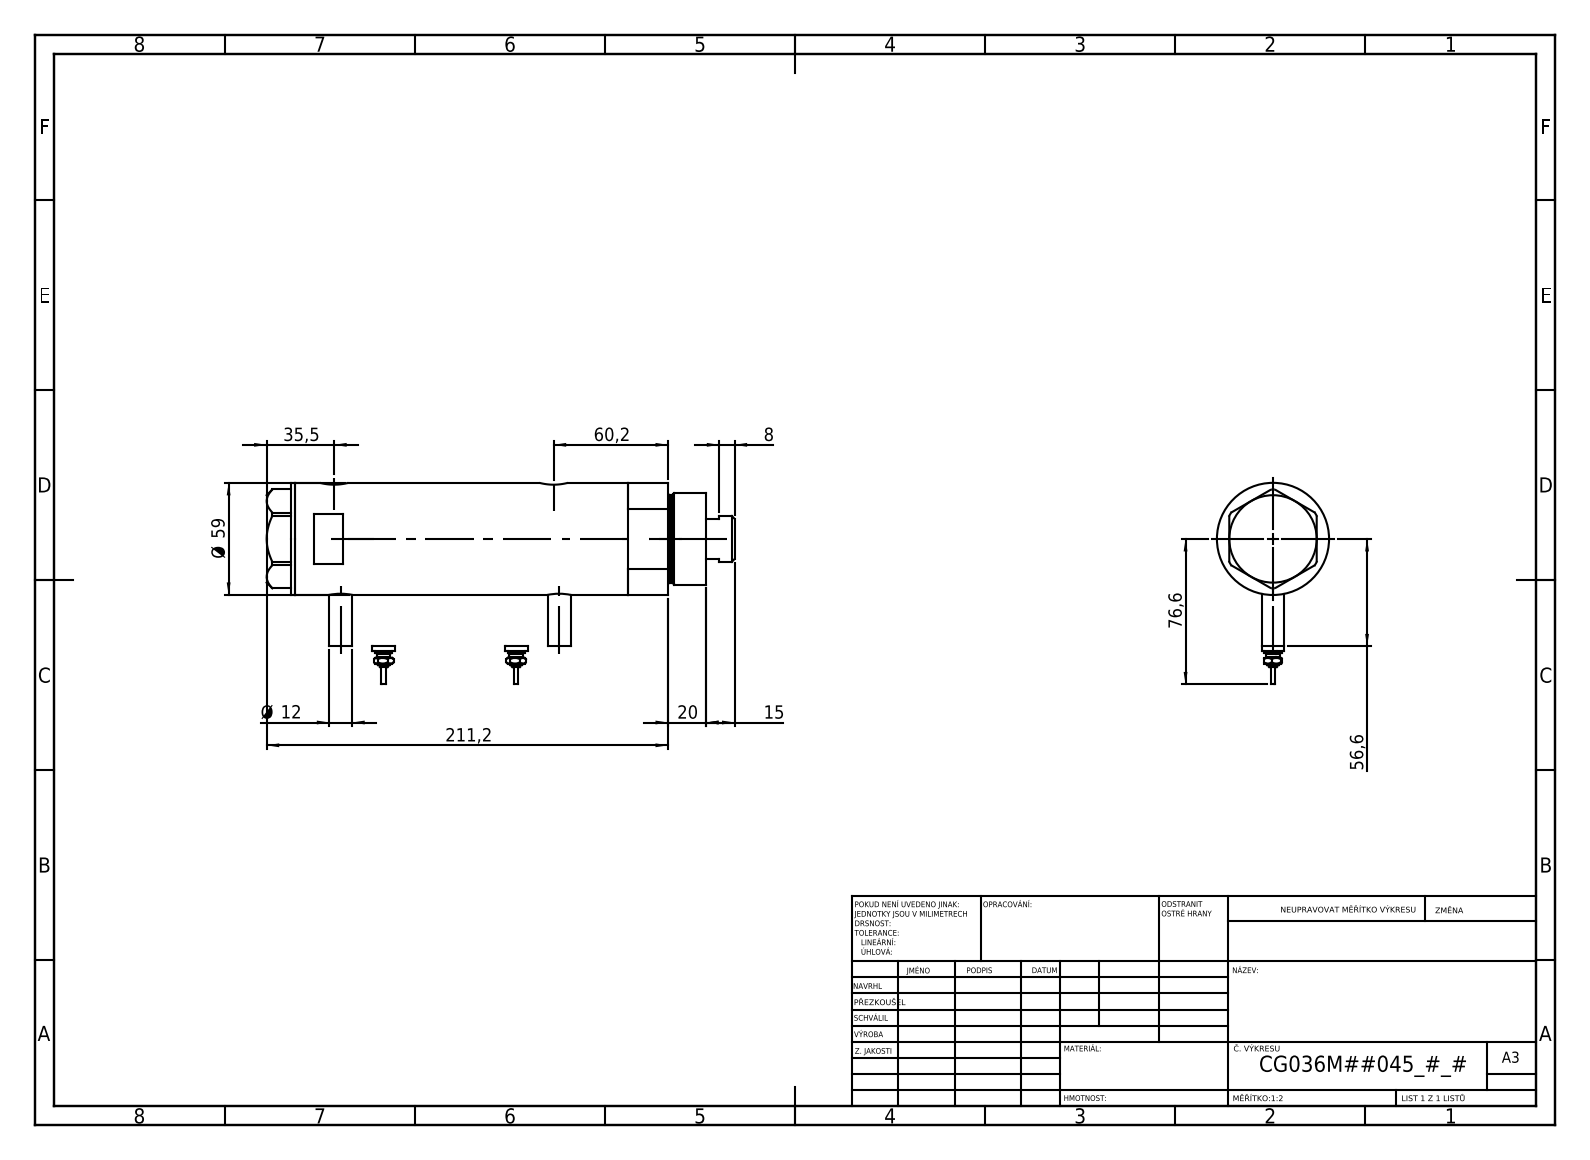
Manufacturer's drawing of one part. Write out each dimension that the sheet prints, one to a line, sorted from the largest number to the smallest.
211,2
76,6
60,2
Ø 59
56,6
35,5
20
15
Ø 12
8
